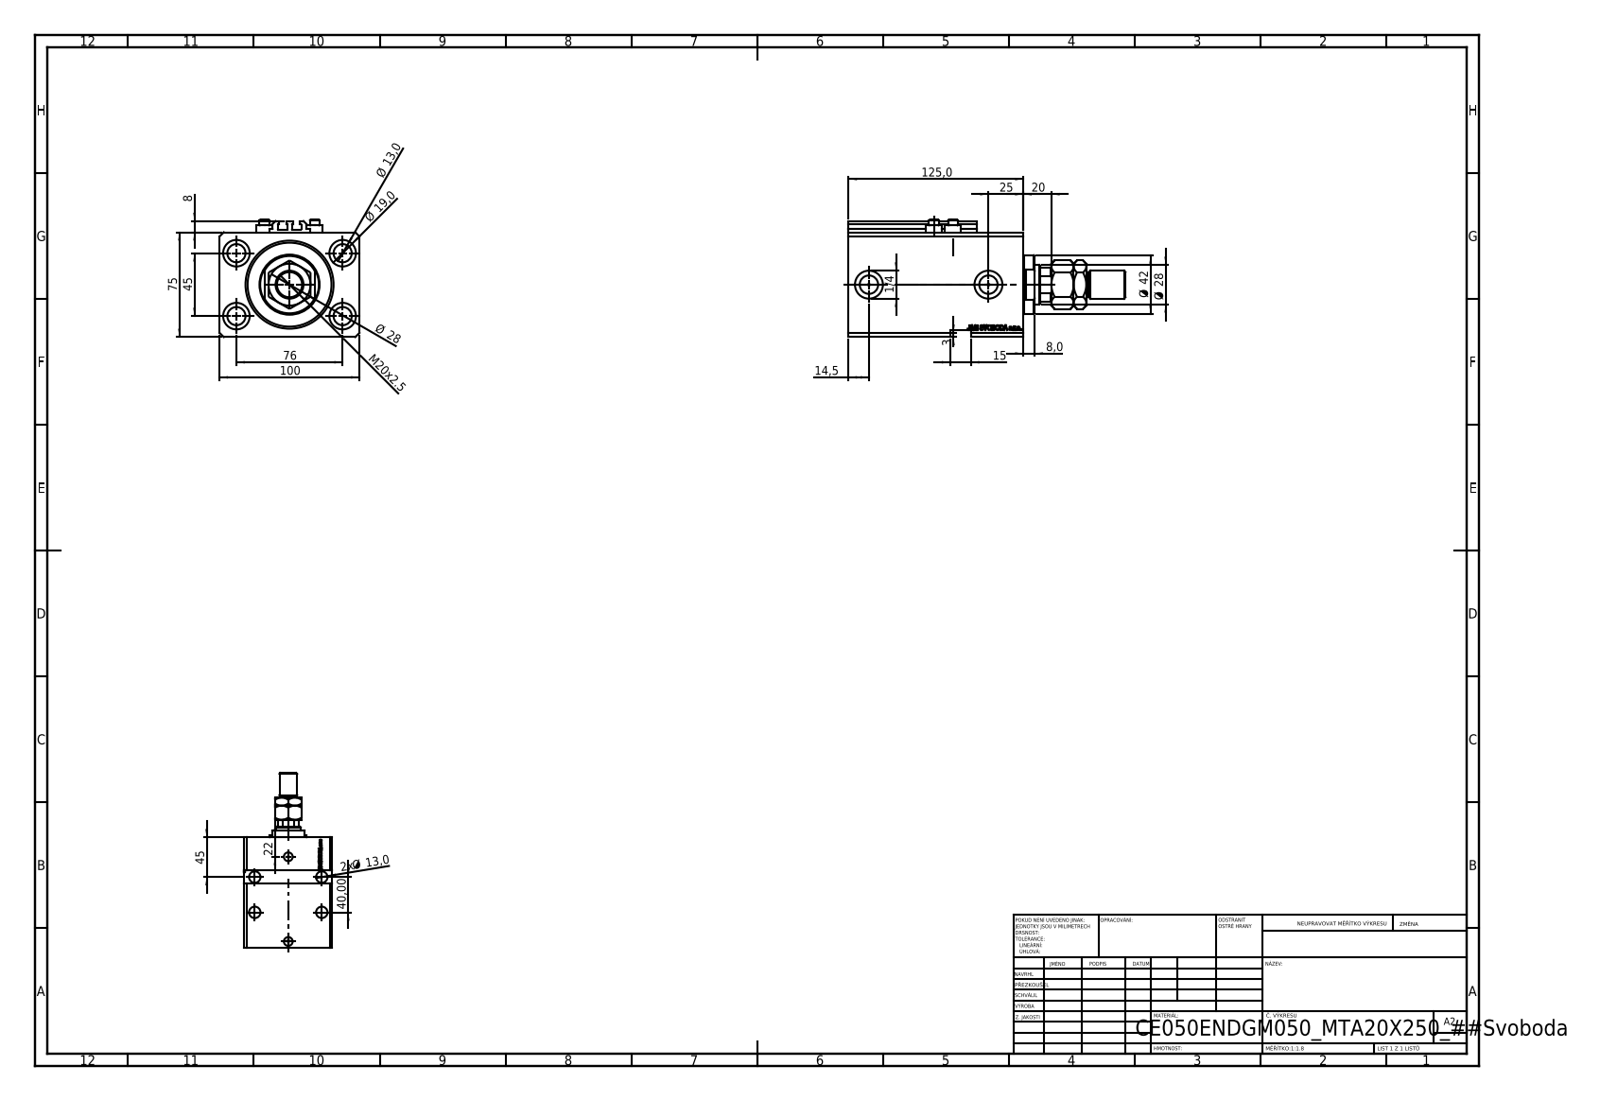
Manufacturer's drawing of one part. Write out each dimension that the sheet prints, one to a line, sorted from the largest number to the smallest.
125,0
100
76
75
45
45
Ø 42
40,00
Ø 28
Ø 28
25
22
M20x2.5
20
Ø 19,0
15
14,5
Ø 13,0
2x Ø 13,0
8
8,0
3
1/4
